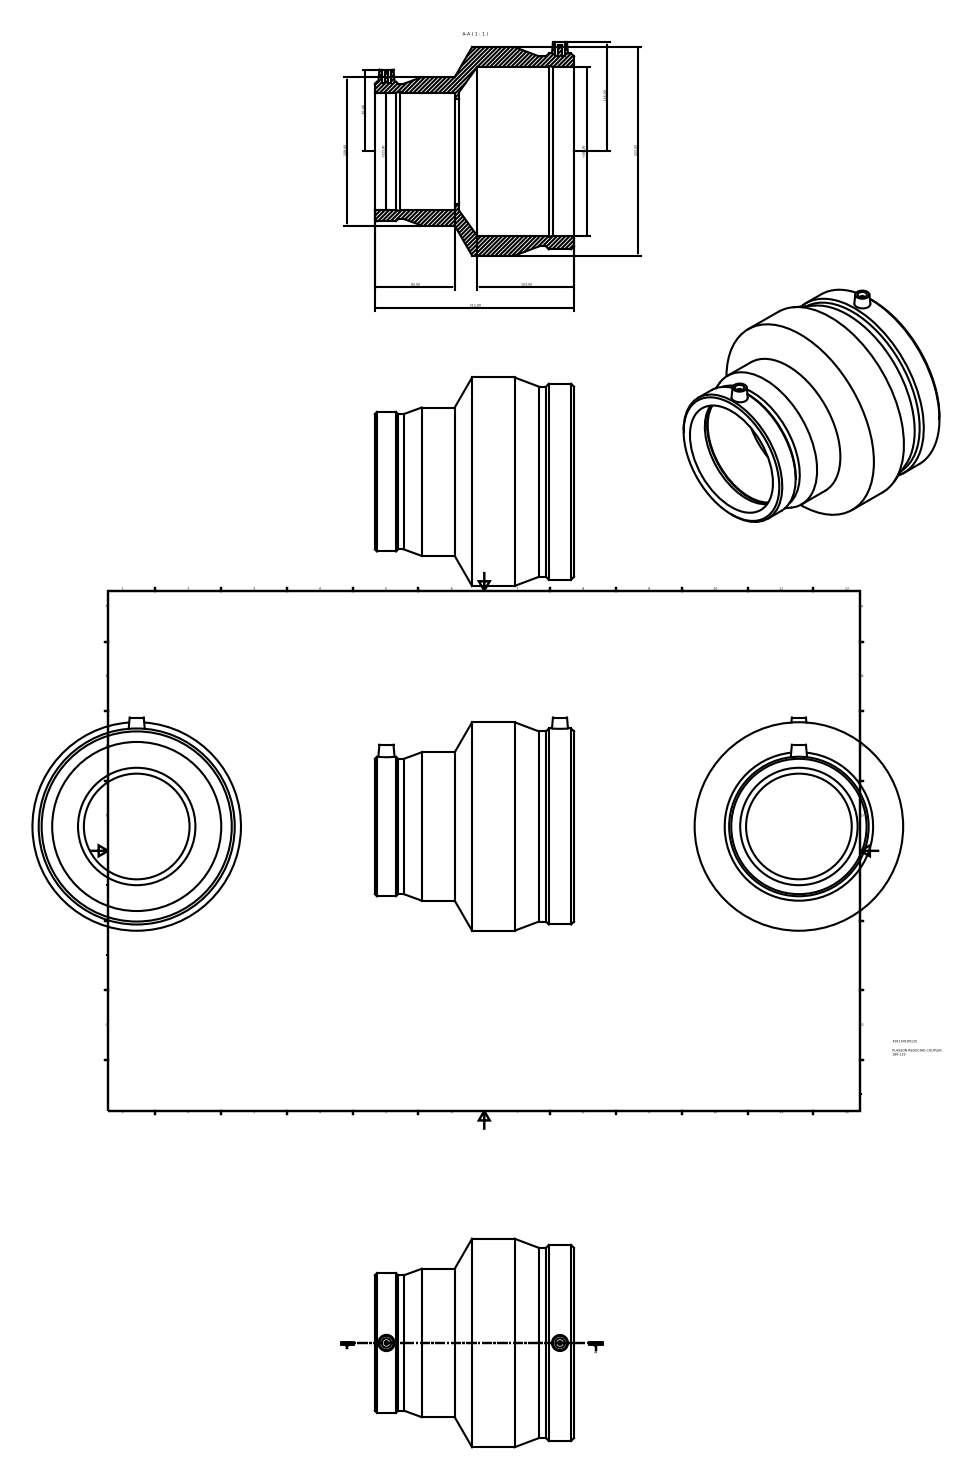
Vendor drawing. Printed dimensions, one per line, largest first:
222,00
212,00
n180,00
158,00
n125,00
116,00
103,00
87,00
85,00
